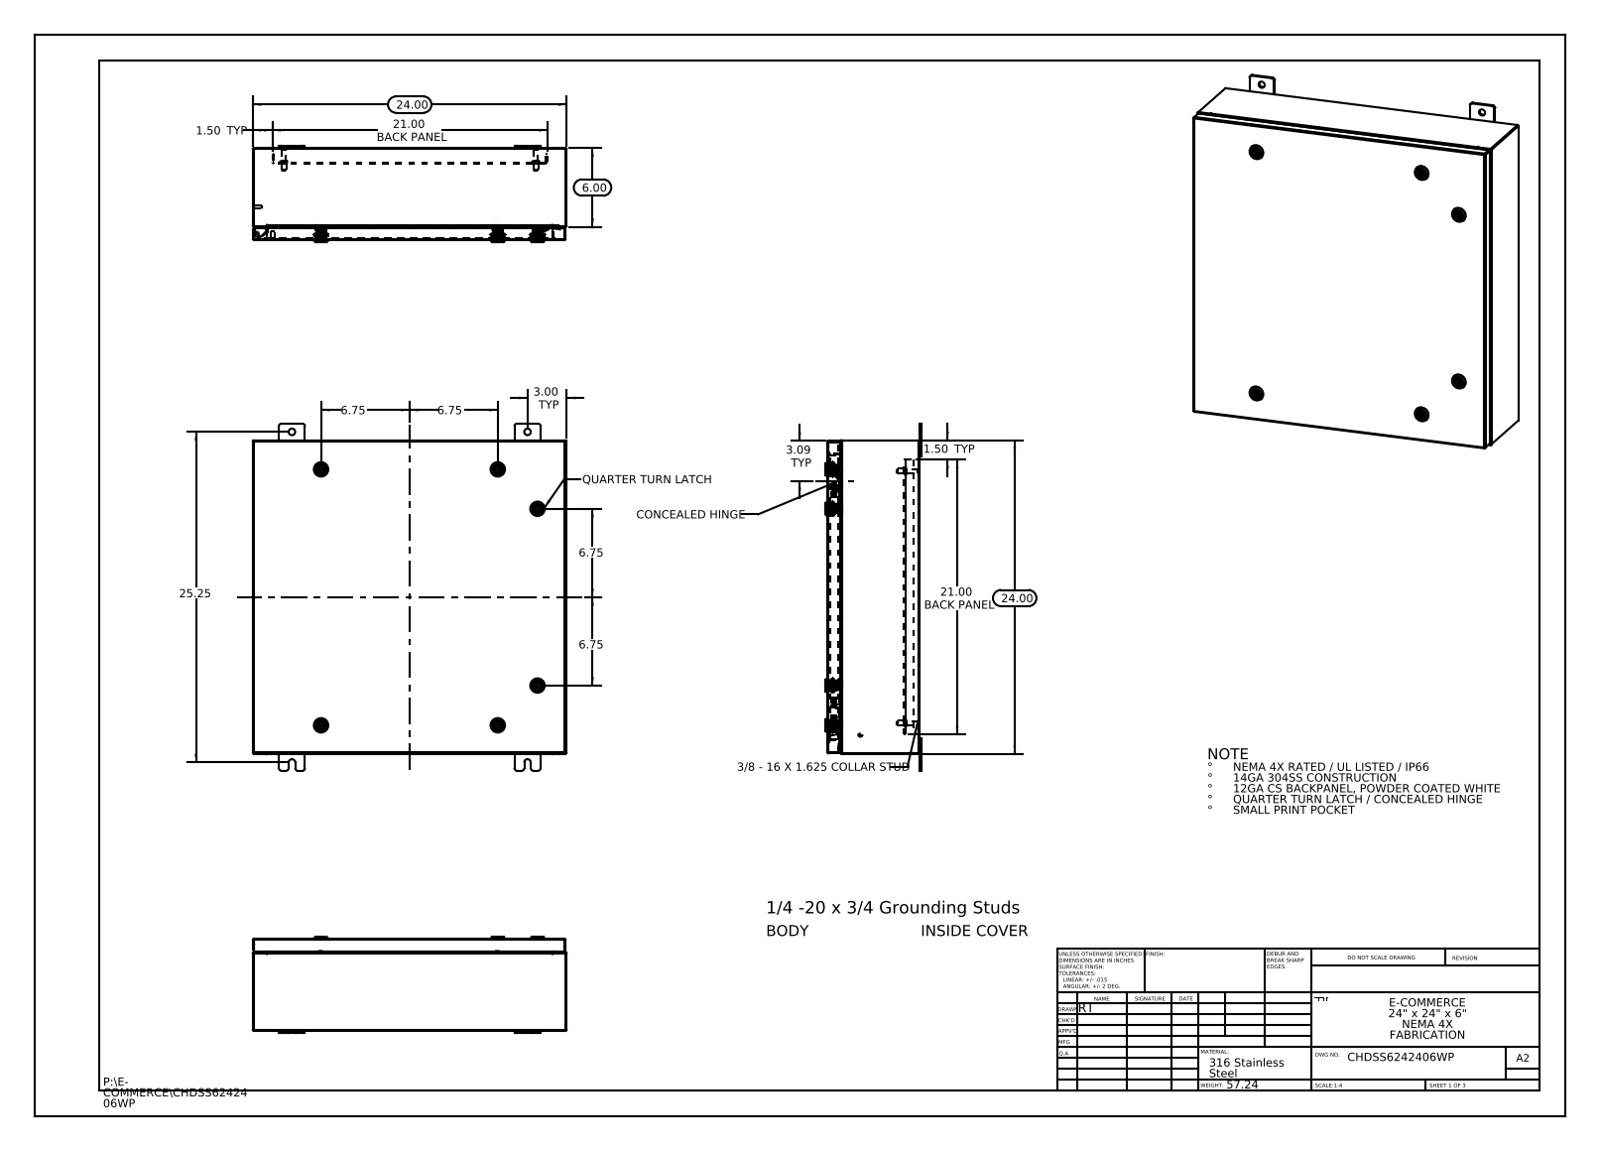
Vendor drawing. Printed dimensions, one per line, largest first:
25.25
24.00
24.00
21.00 BACK PANEL
21.00 BACK PANEL
6.75
6.75
6.75
6.75
6.00
3.09 TYP
3.00 TYP
1.50 TYP
1.50 TYP
